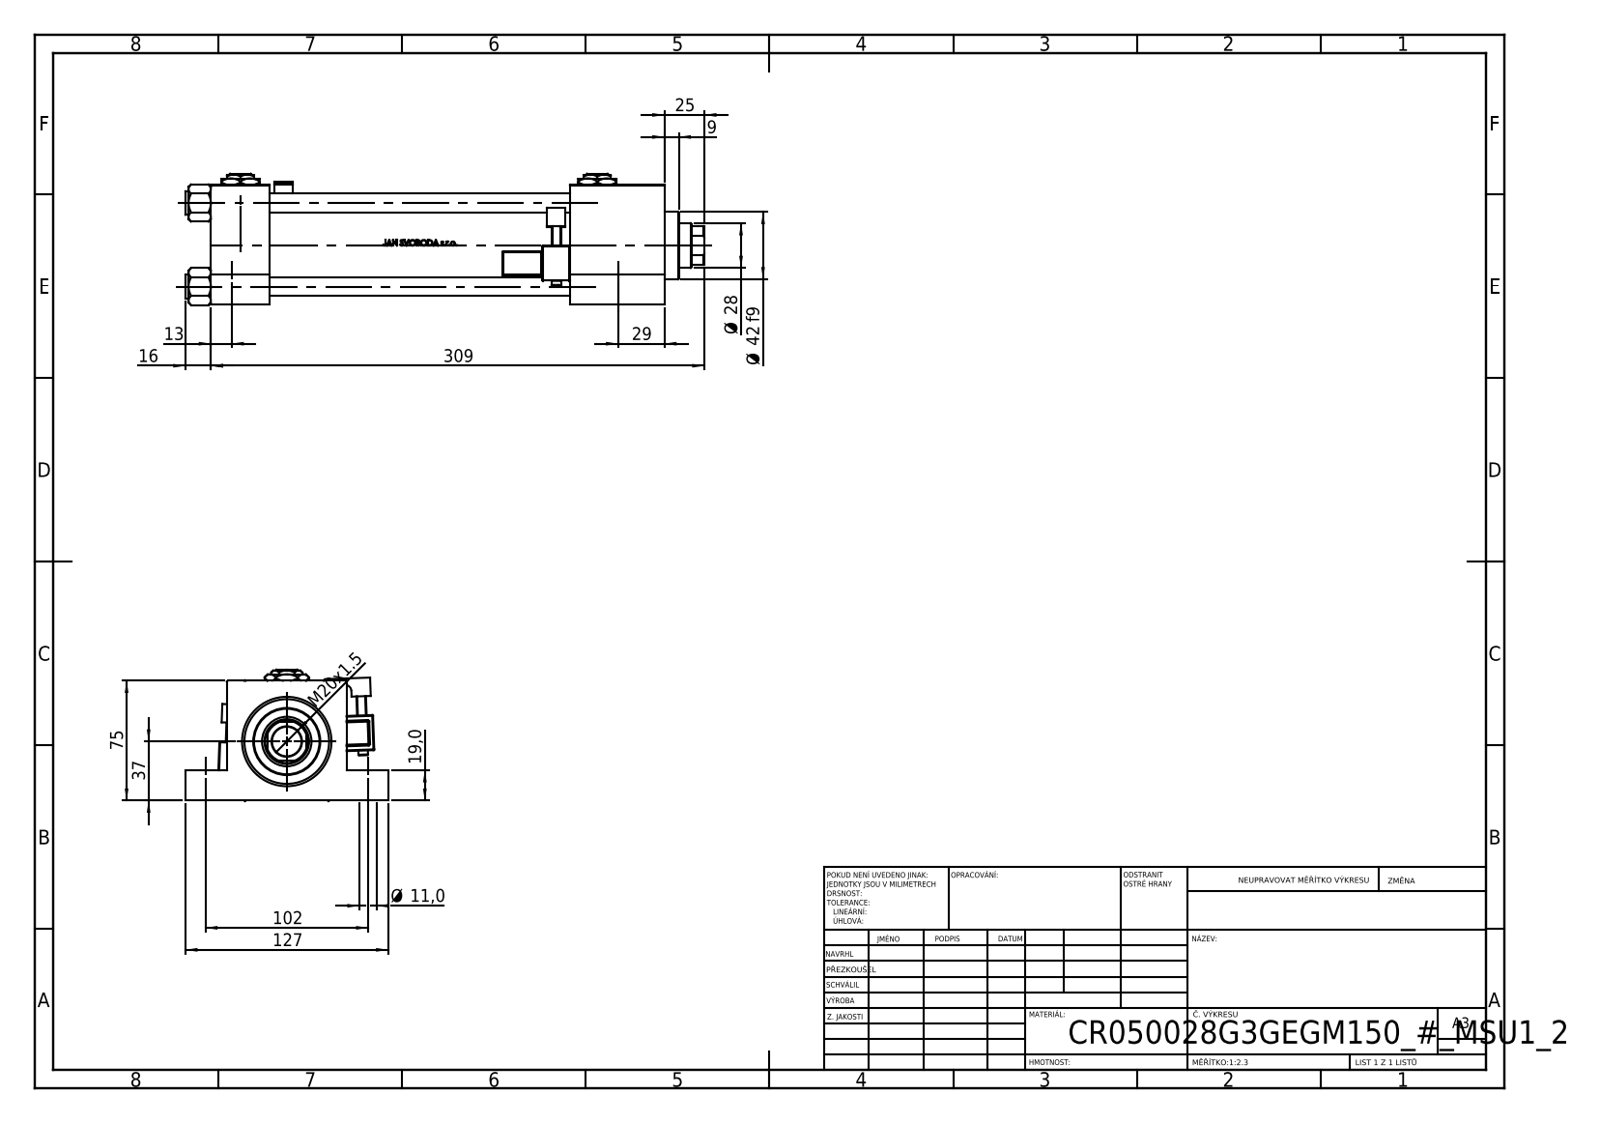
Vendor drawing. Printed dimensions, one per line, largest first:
309
127
102
75
Ø 42 f9
37
29
Ø 28
25
M20x1.5
19,0
16
13
Ø 11,0
9
